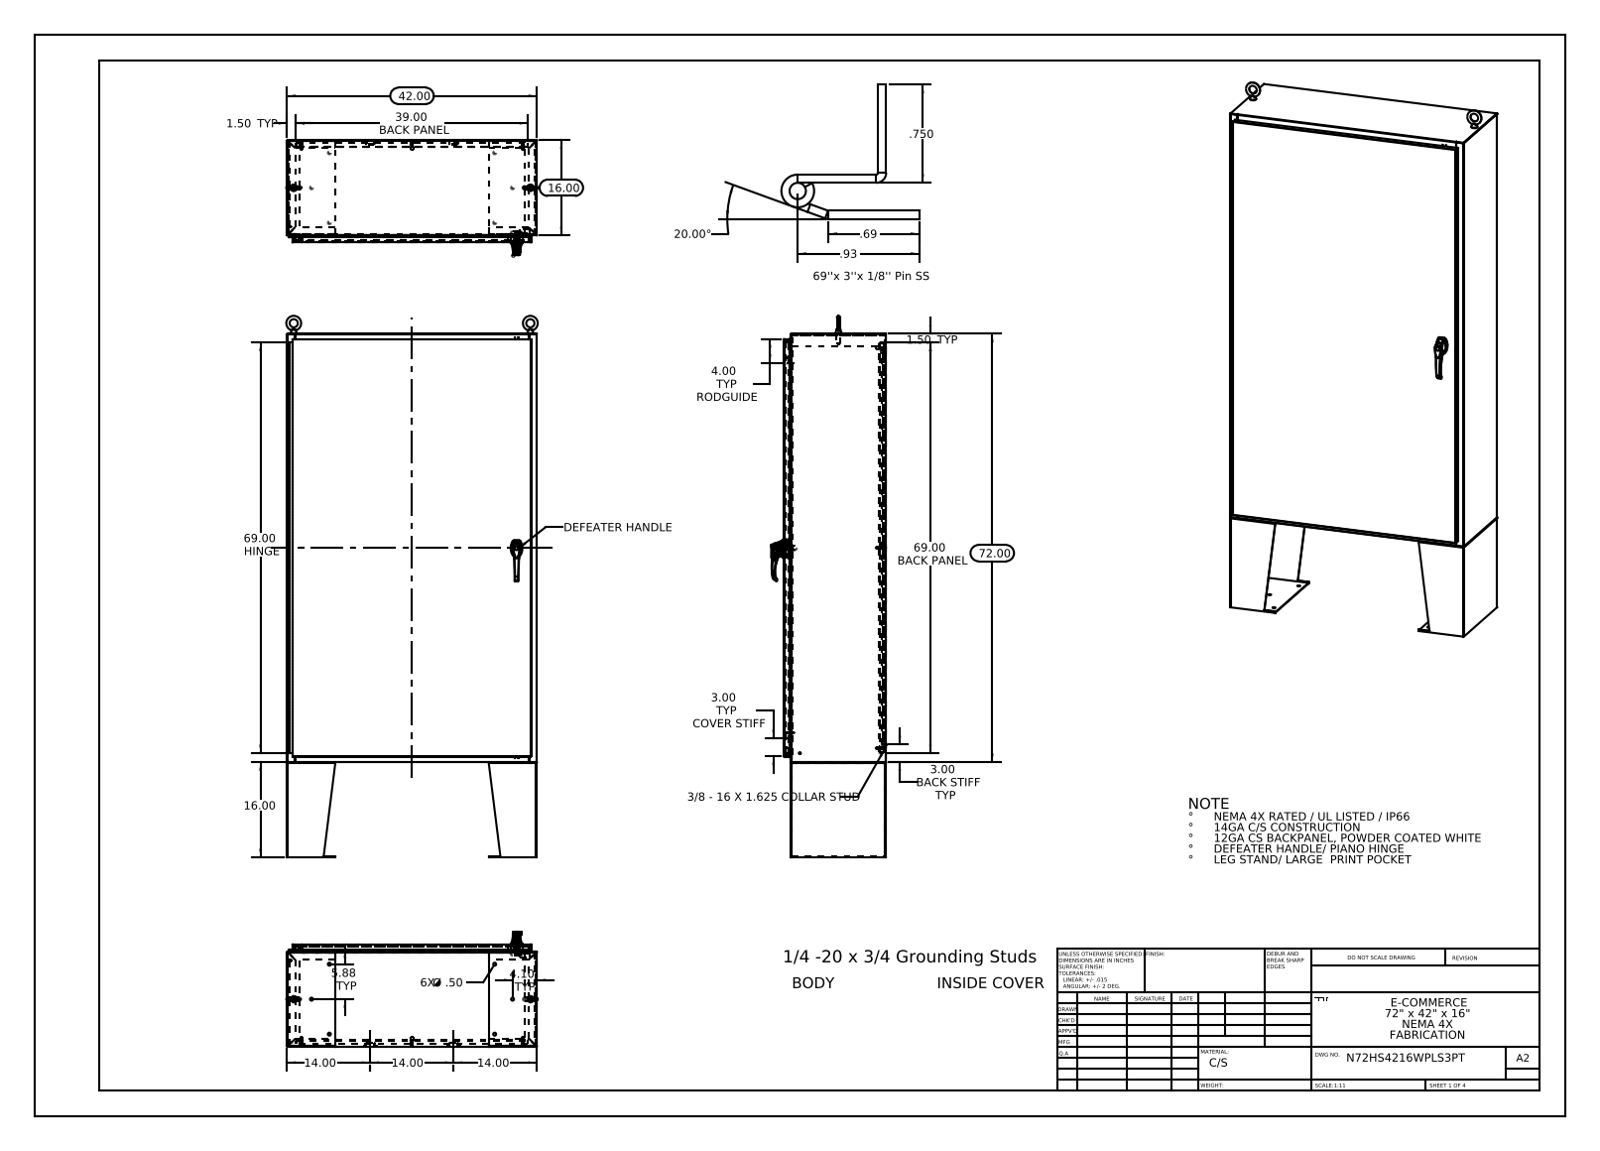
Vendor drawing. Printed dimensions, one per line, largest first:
72.00
69.00 HINGE
69.00 BACK PANEL
42.00
39.00 BACK PANEL
20.00°
16.00
16.00
14.00
14.00
14.00
5.88 TYP
4.10 TYP
4.00 TYP RODGUIDE
3.00 TYP COVER STIFF
3.00 BACK STIFF TYP
1.50 TYP
1.50 TYP
.93
.750
.69
6X Ø .50
